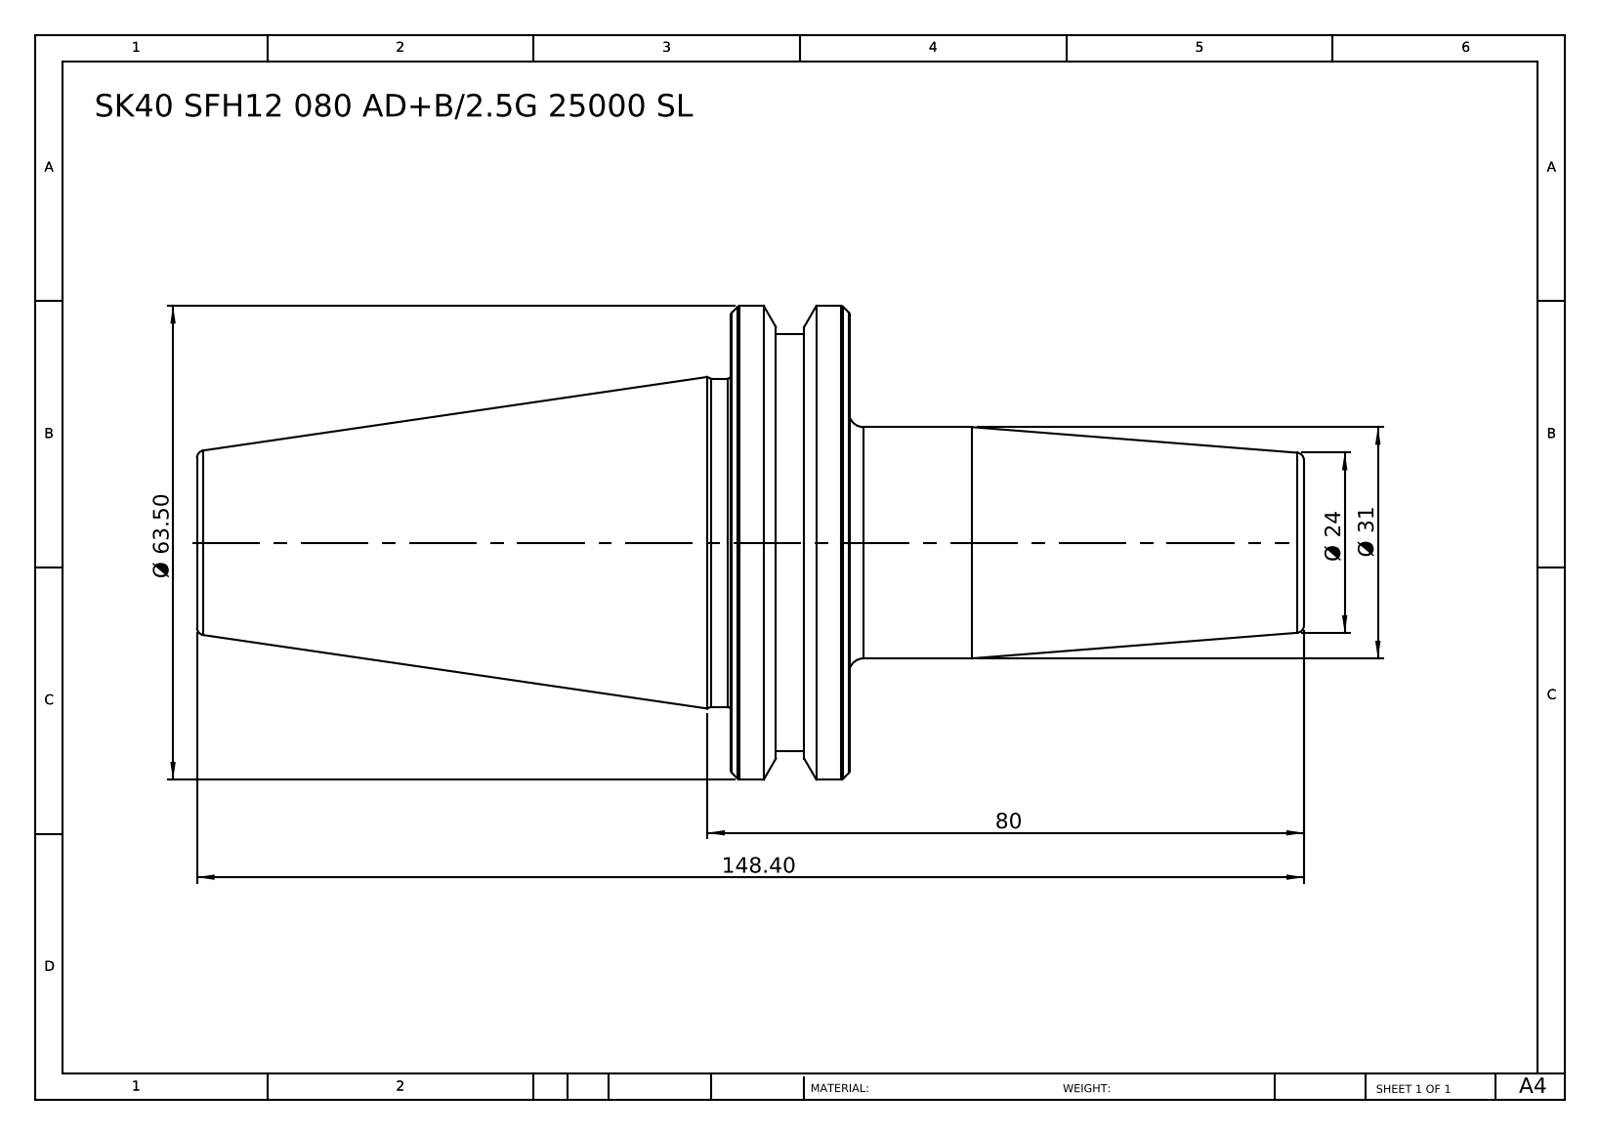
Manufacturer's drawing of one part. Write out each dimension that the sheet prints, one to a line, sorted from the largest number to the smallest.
148.40
80
Ø 63.50
Ø 31
Ø 24
